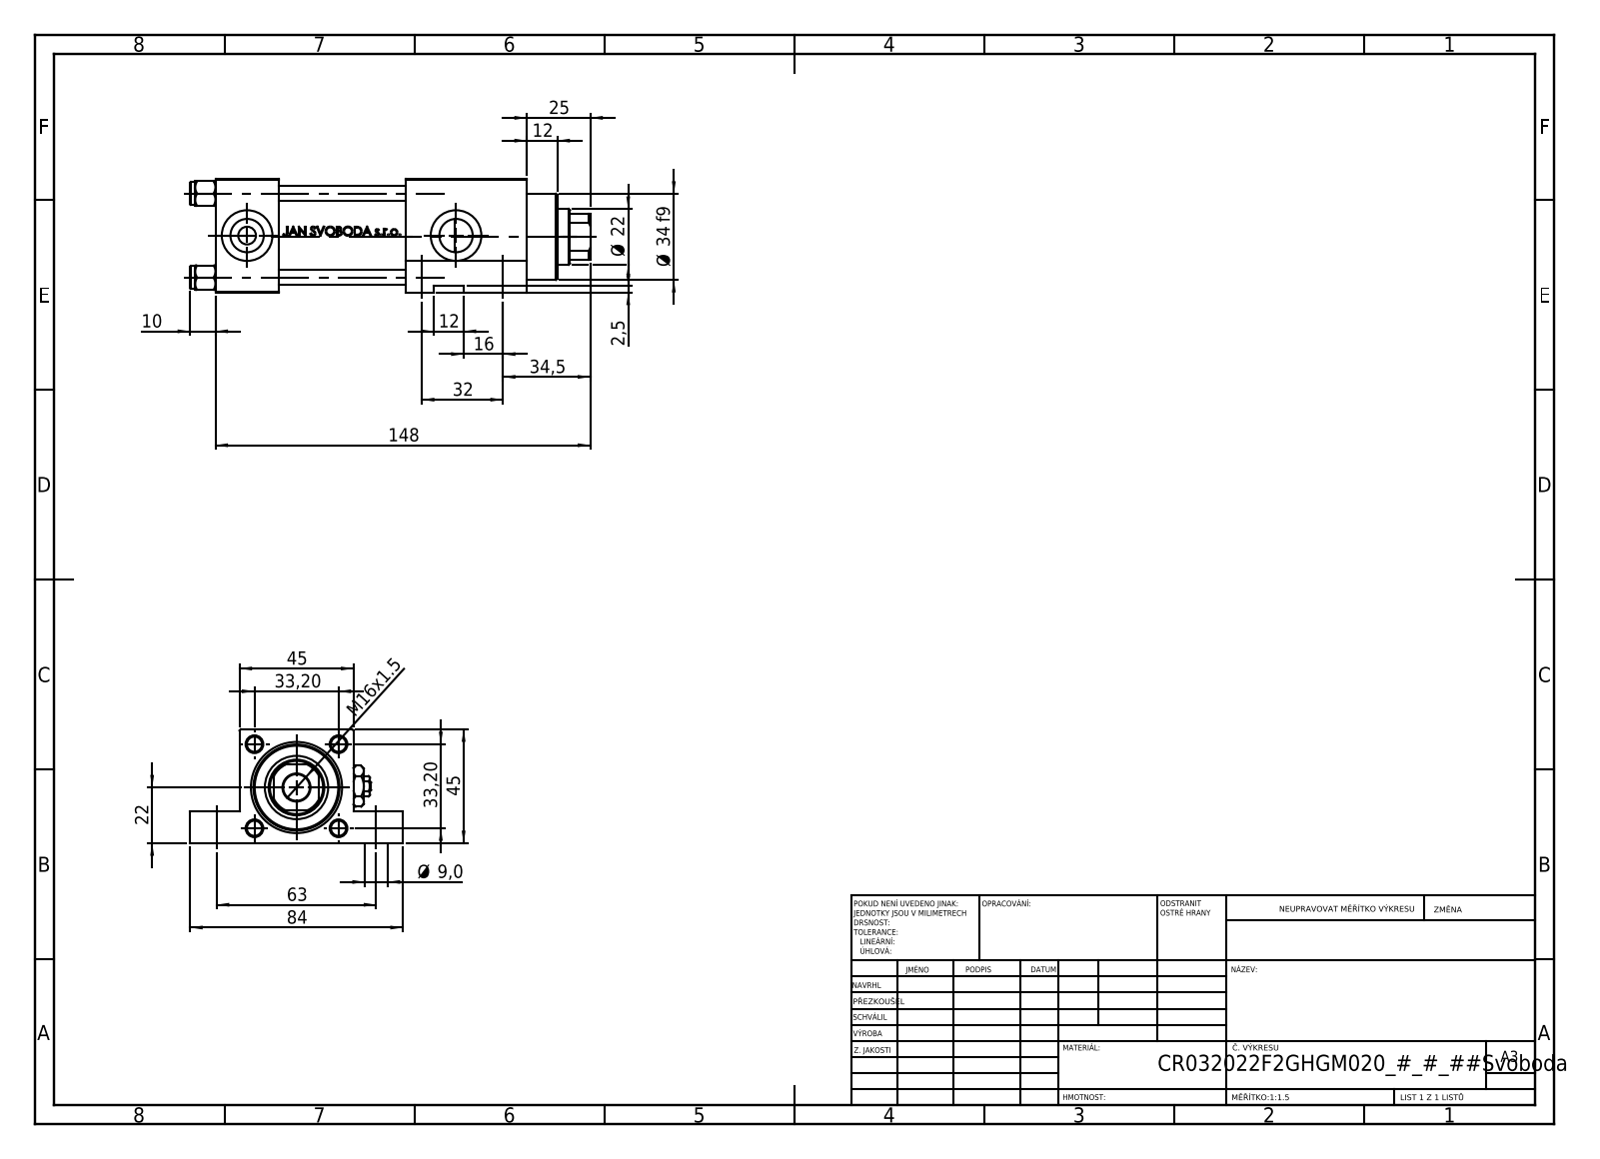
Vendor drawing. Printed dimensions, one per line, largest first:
148
84
63
45
45
34,5
Ø 34 f9
33,20
33,20
32
25
Ø 22
22
16
M16x1.5
12
12
10
Ø 9,0
2,5
